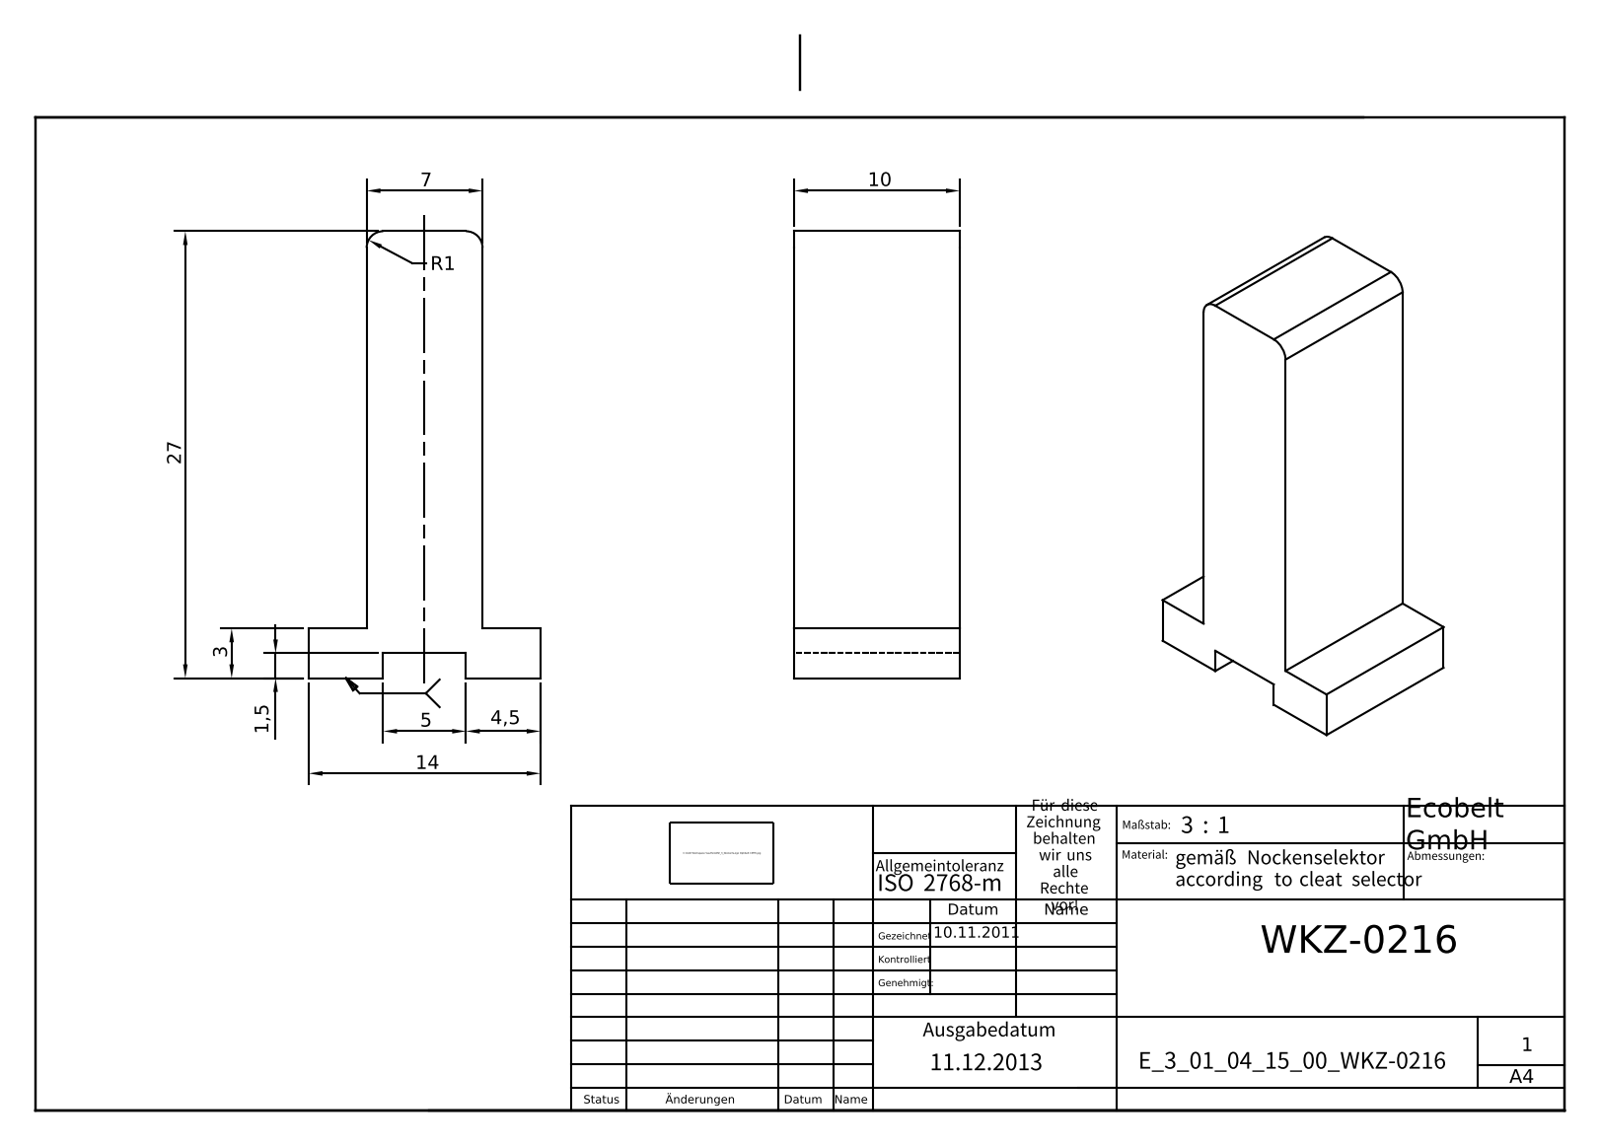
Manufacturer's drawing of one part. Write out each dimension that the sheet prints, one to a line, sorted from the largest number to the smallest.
27
14
10
7
5
4,5
3
1,5
R1
